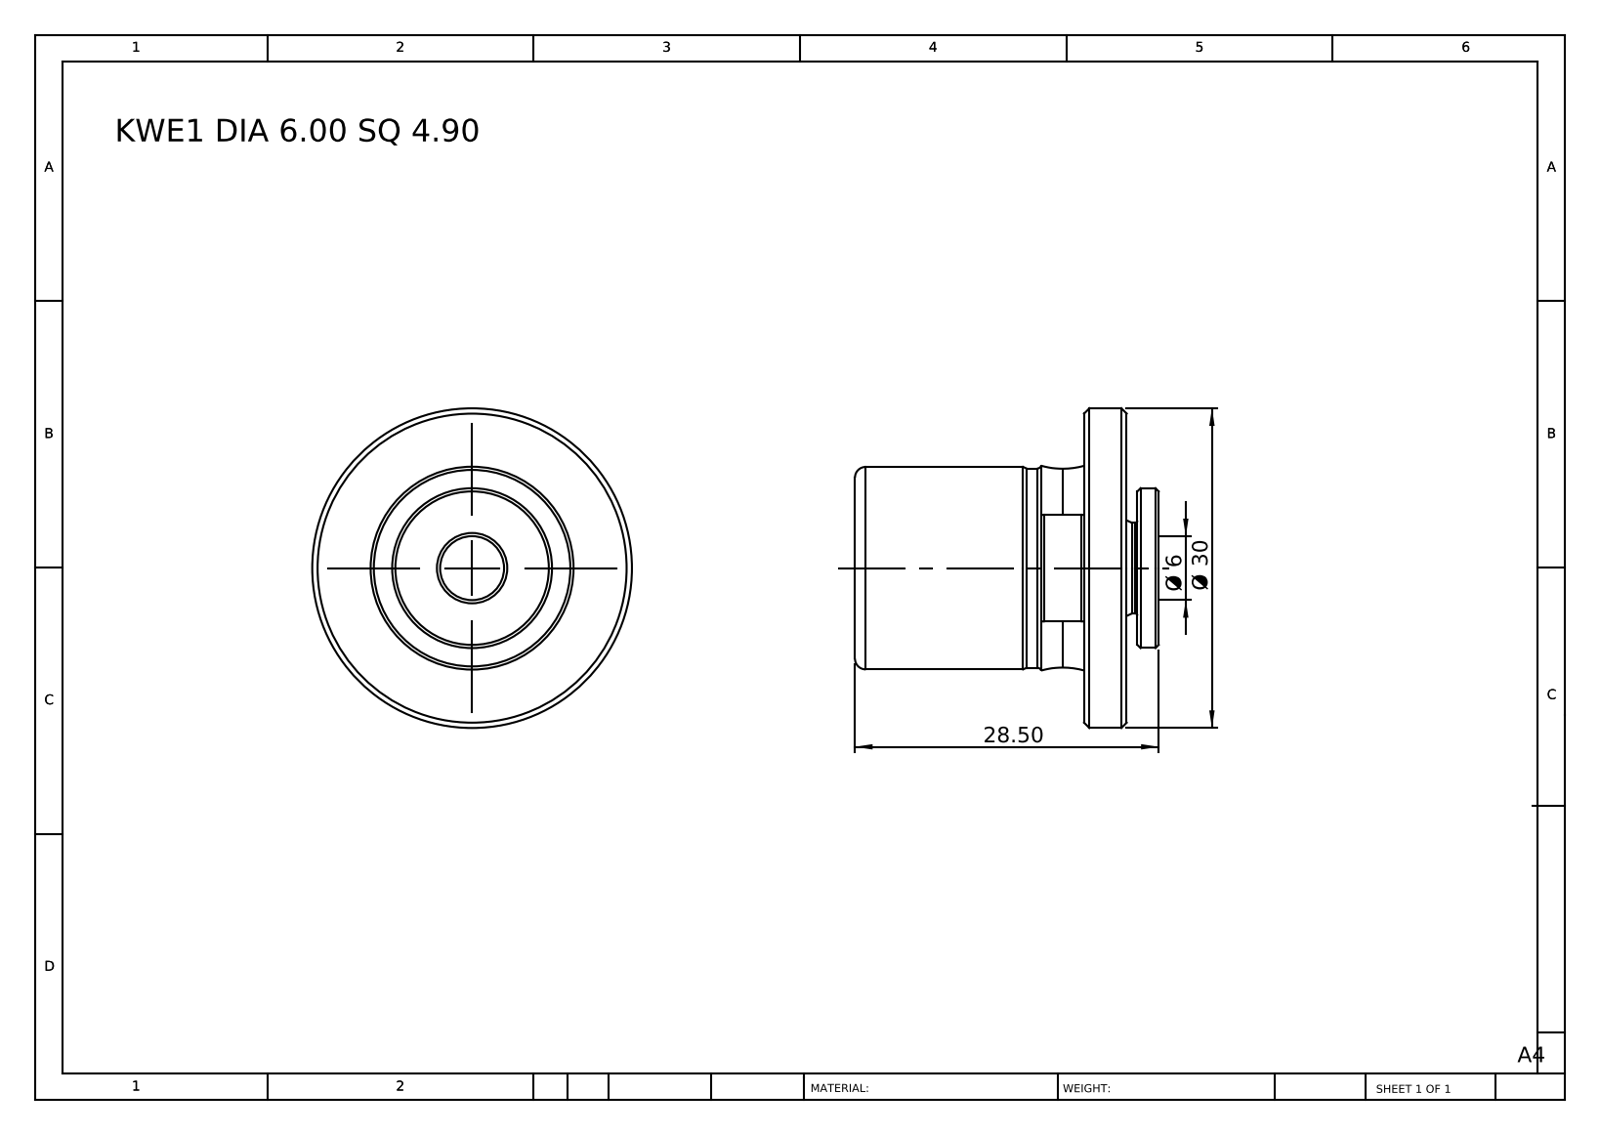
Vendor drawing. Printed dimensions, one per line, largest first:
Ø 30
28.50
Ø 6
